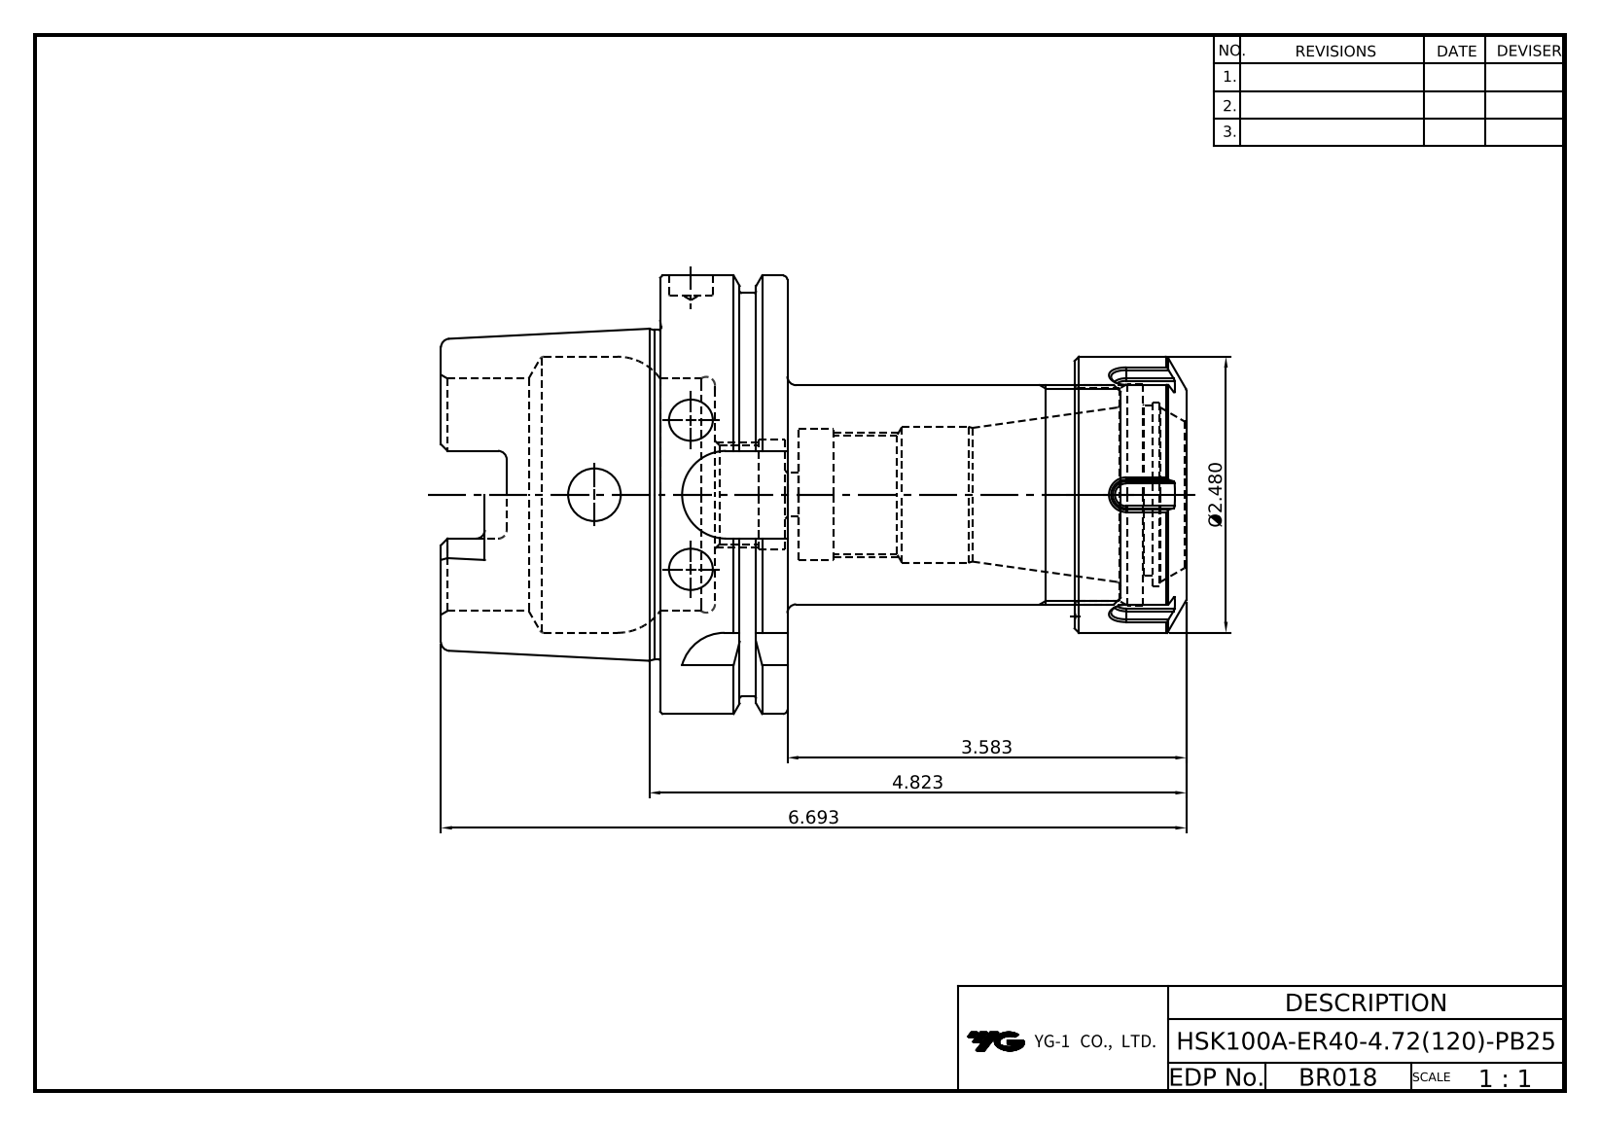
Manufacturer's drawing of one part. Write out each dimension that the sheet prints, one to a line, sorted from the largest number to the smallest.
6.693
4.823
3.583
Ø2.480
